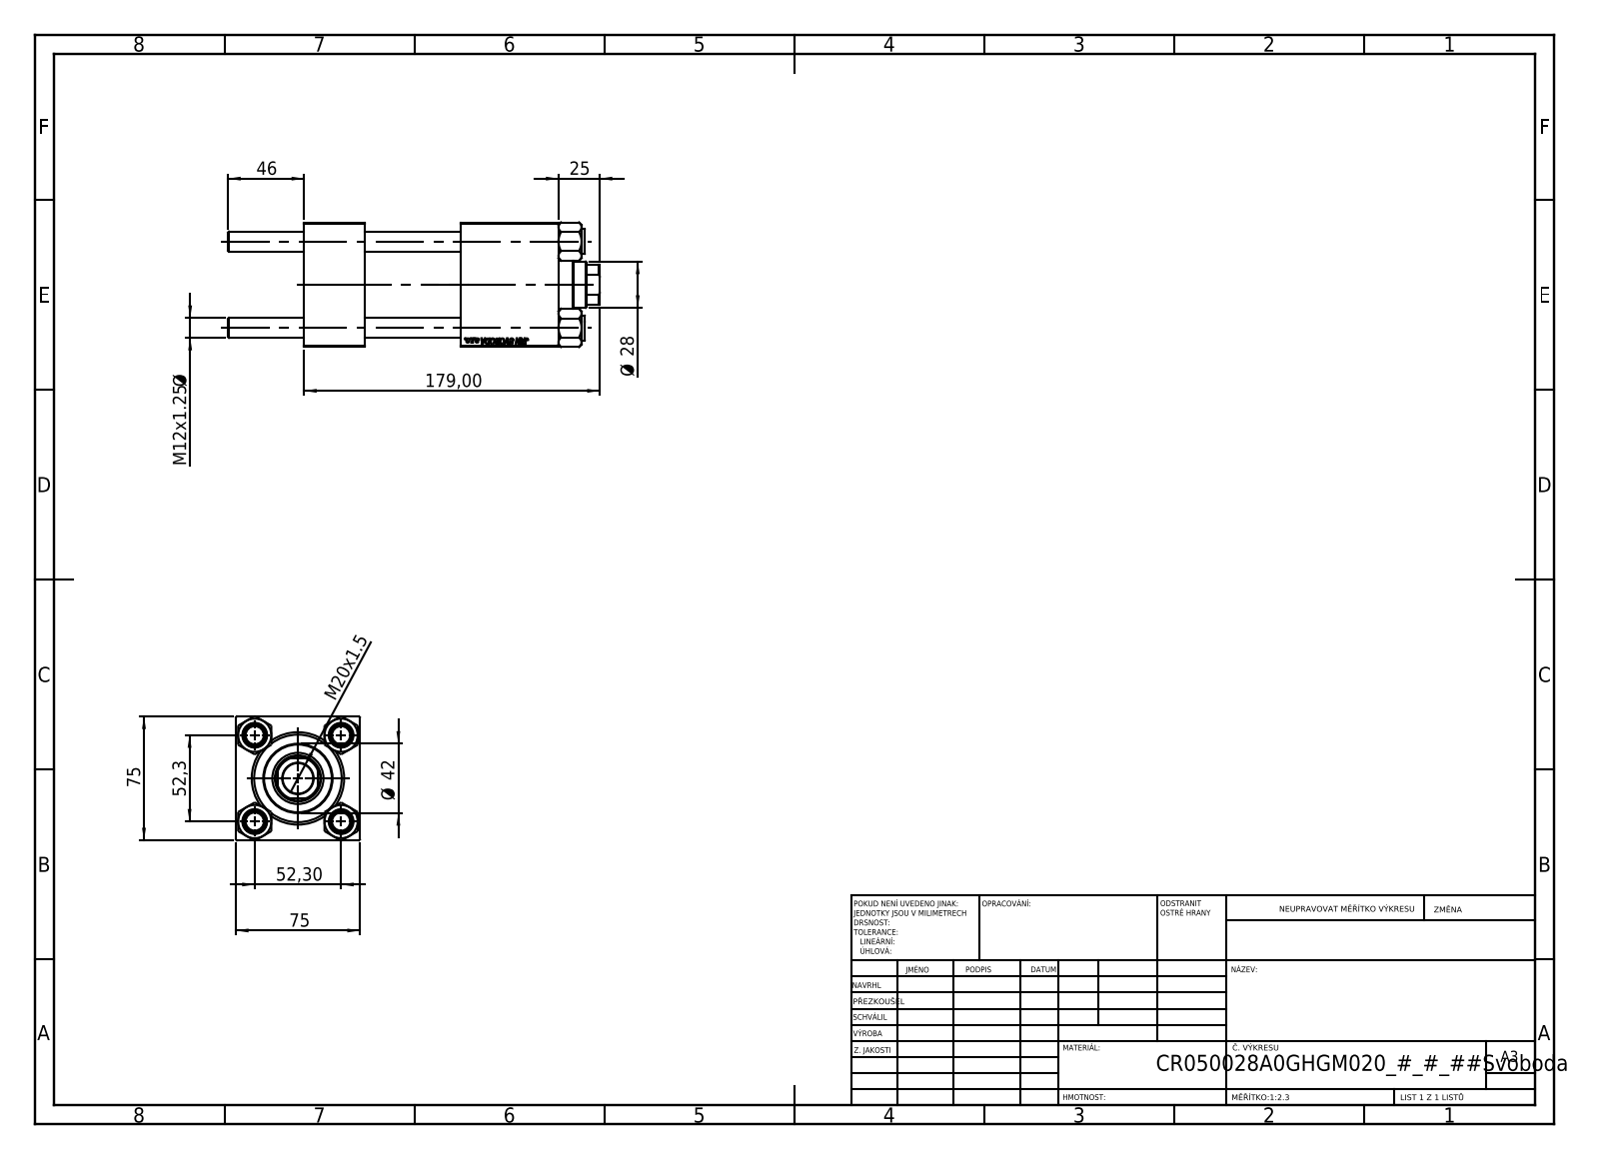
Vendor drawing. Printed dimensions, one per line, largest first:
179,00
75
75
52,3
52,30
46
Ø 42
Ø 28
25
M20x1.5
M12x1.25 Ø
